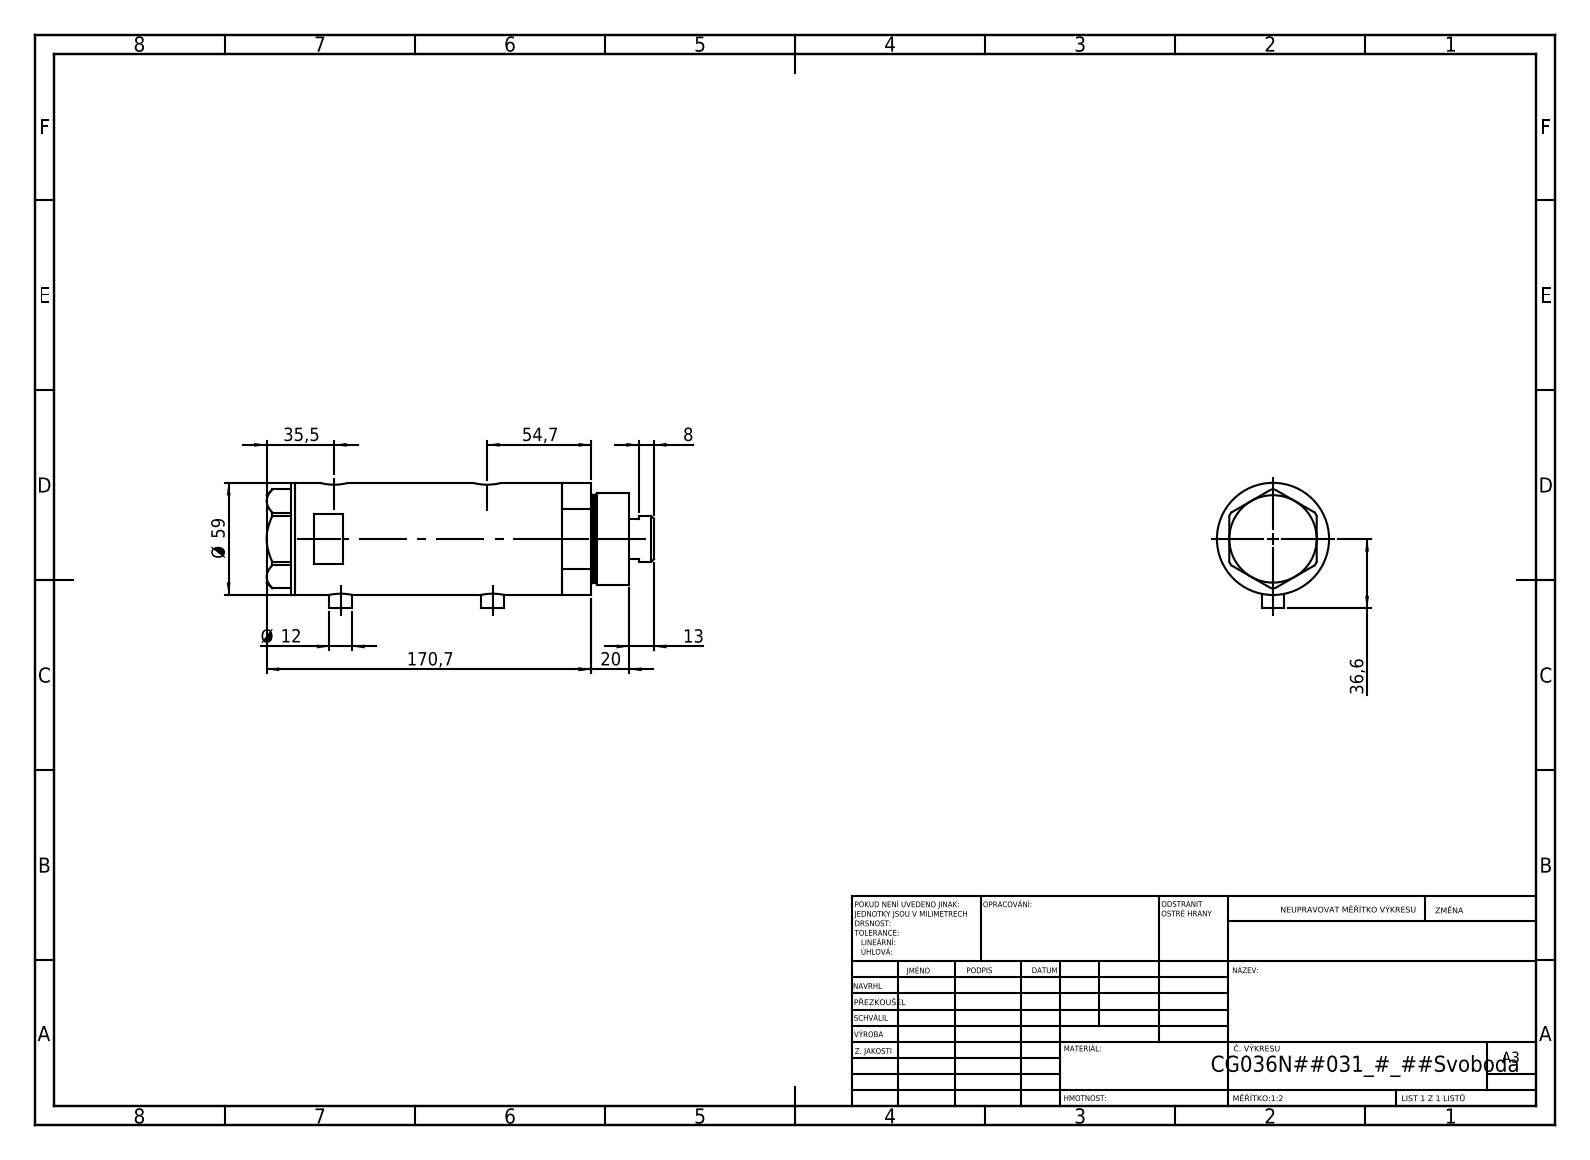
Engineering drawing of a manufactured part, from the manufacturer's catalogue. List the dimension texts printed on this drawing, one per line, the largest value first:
170,7
Ø 59
54,7
36,6
35,5
20
13
Ø 12
8
